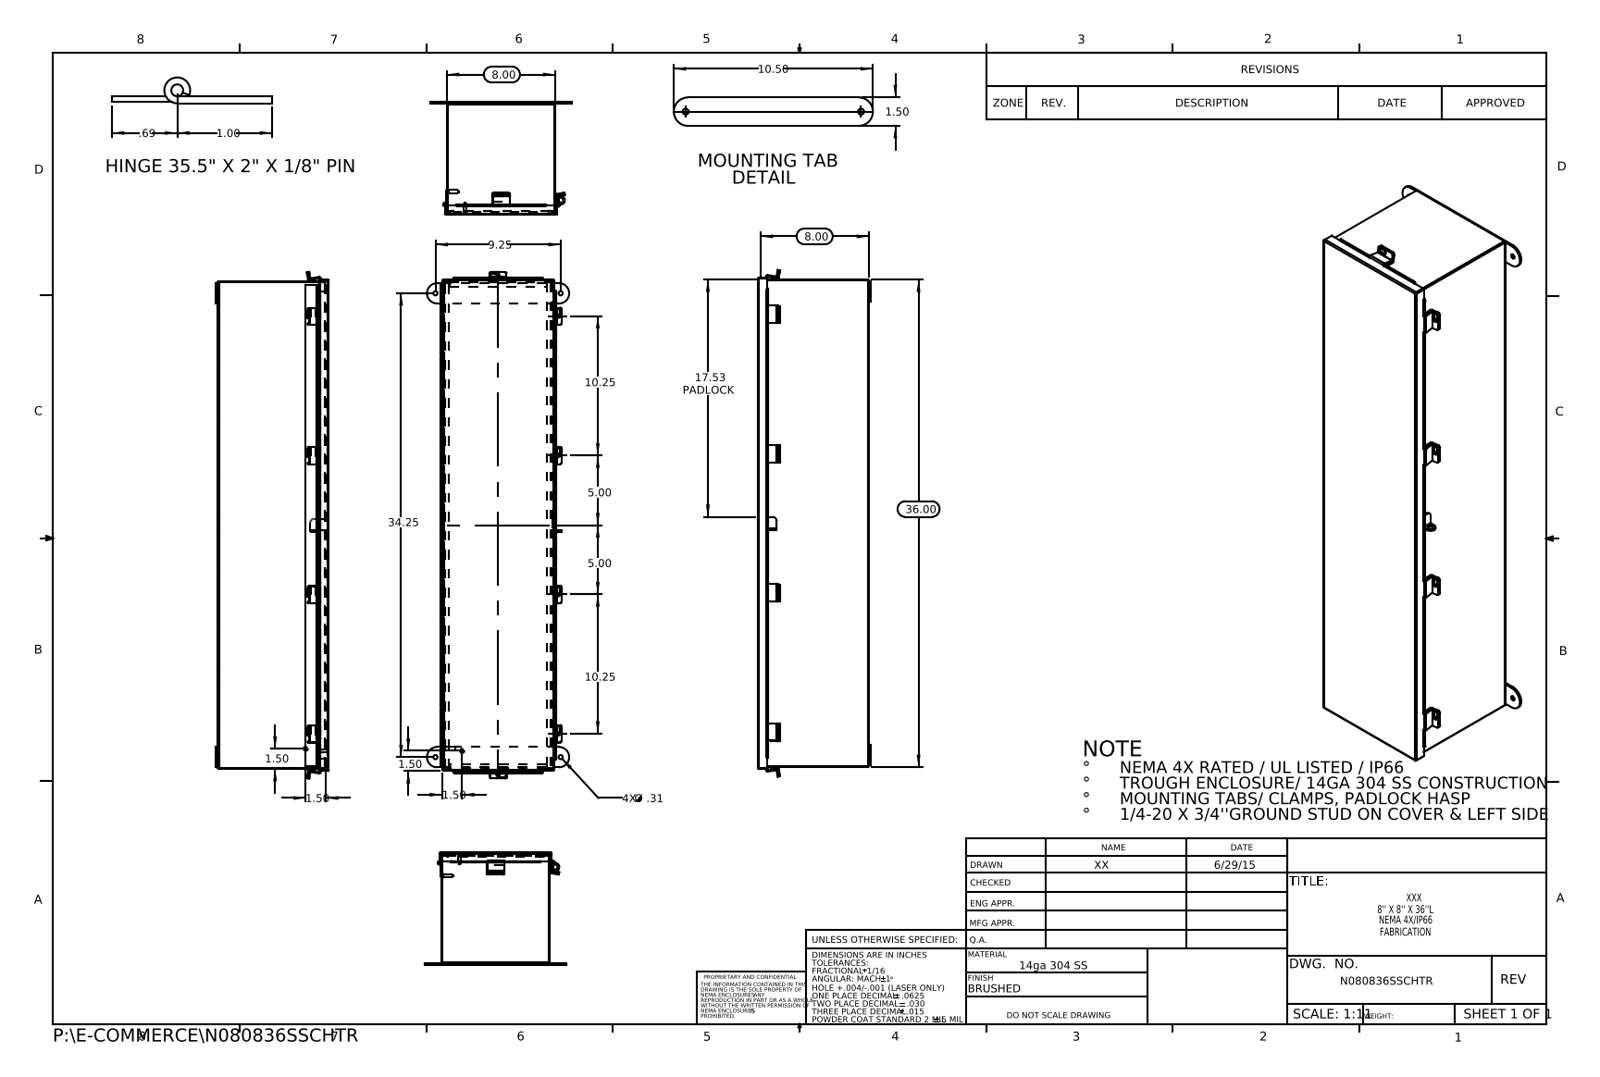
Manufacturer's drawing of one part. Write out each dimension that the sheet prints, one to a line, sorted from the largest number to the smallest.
36.00
34.25
17.53 PADLOCK
10.50
10.25
10.25
9.25
8.00
8.00
5.00
5.00
1.50
1.50
1.50
1.50
1.50
1.00
.69
4X Ø .31
